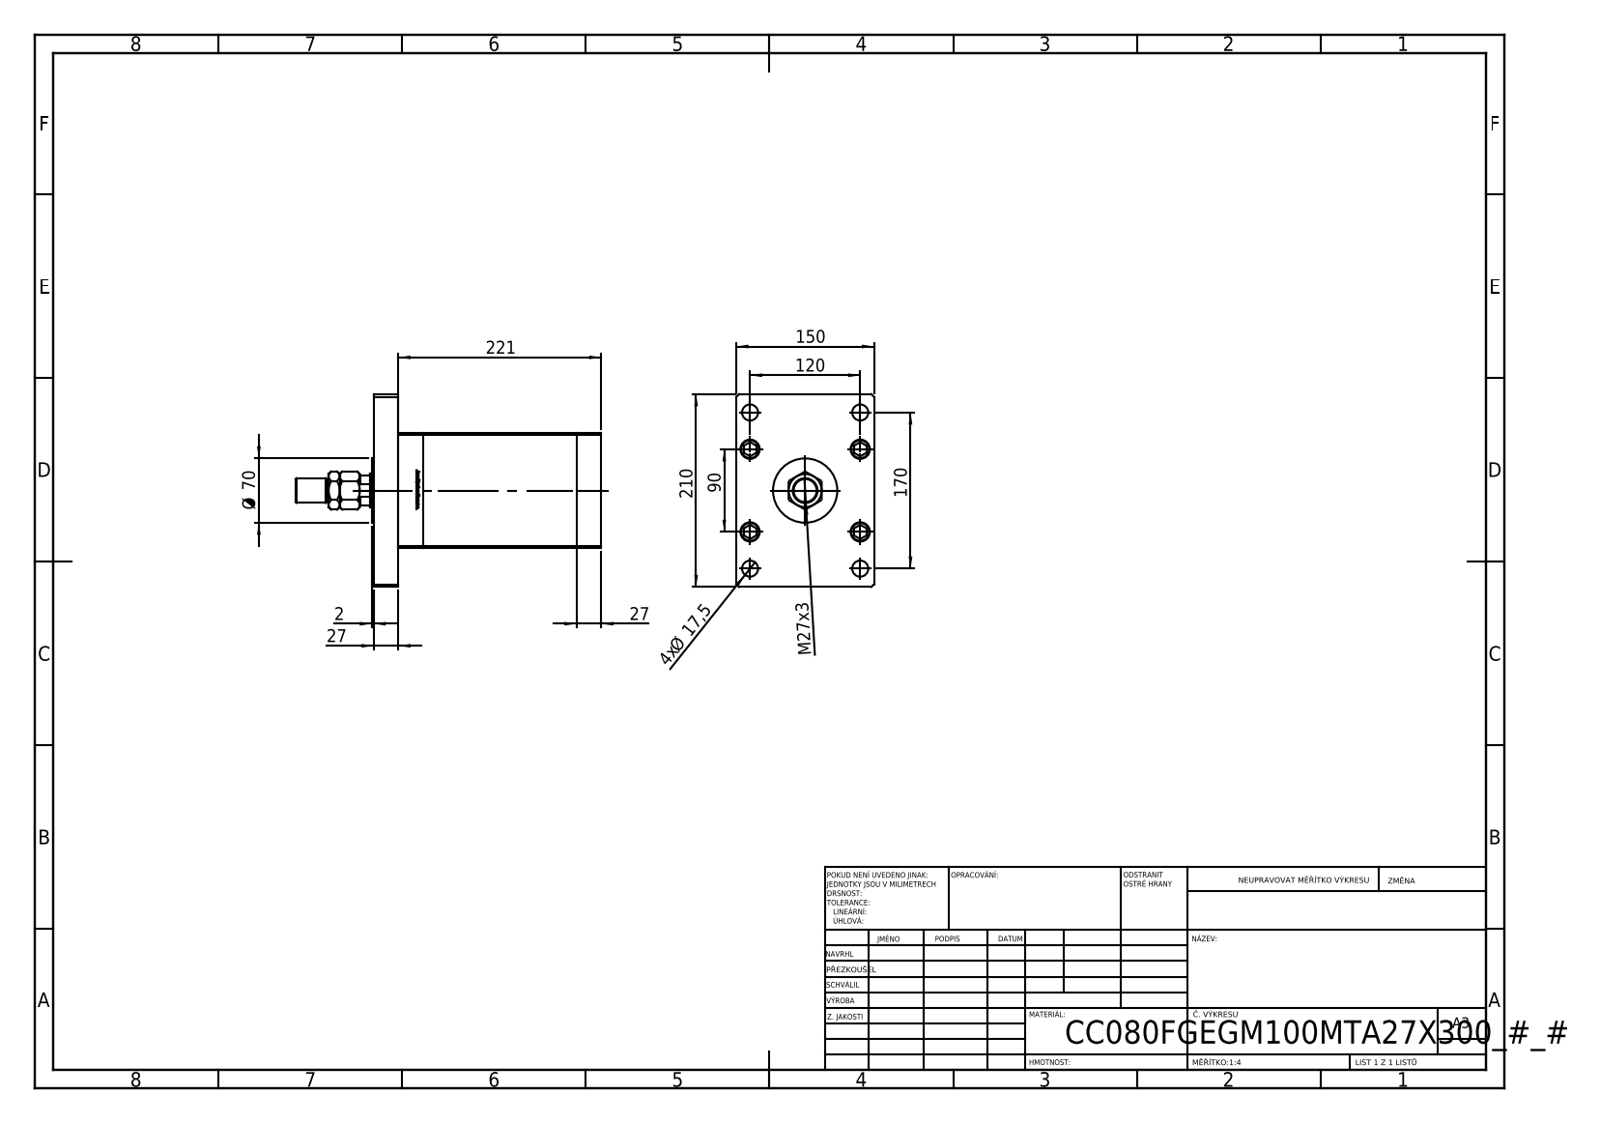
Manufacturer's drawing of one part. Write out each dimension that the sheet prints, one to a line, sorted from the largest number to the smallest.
221
210
170
150
120
90
Ø 70
27
27
M27x3
4x Ø 17,5
2
